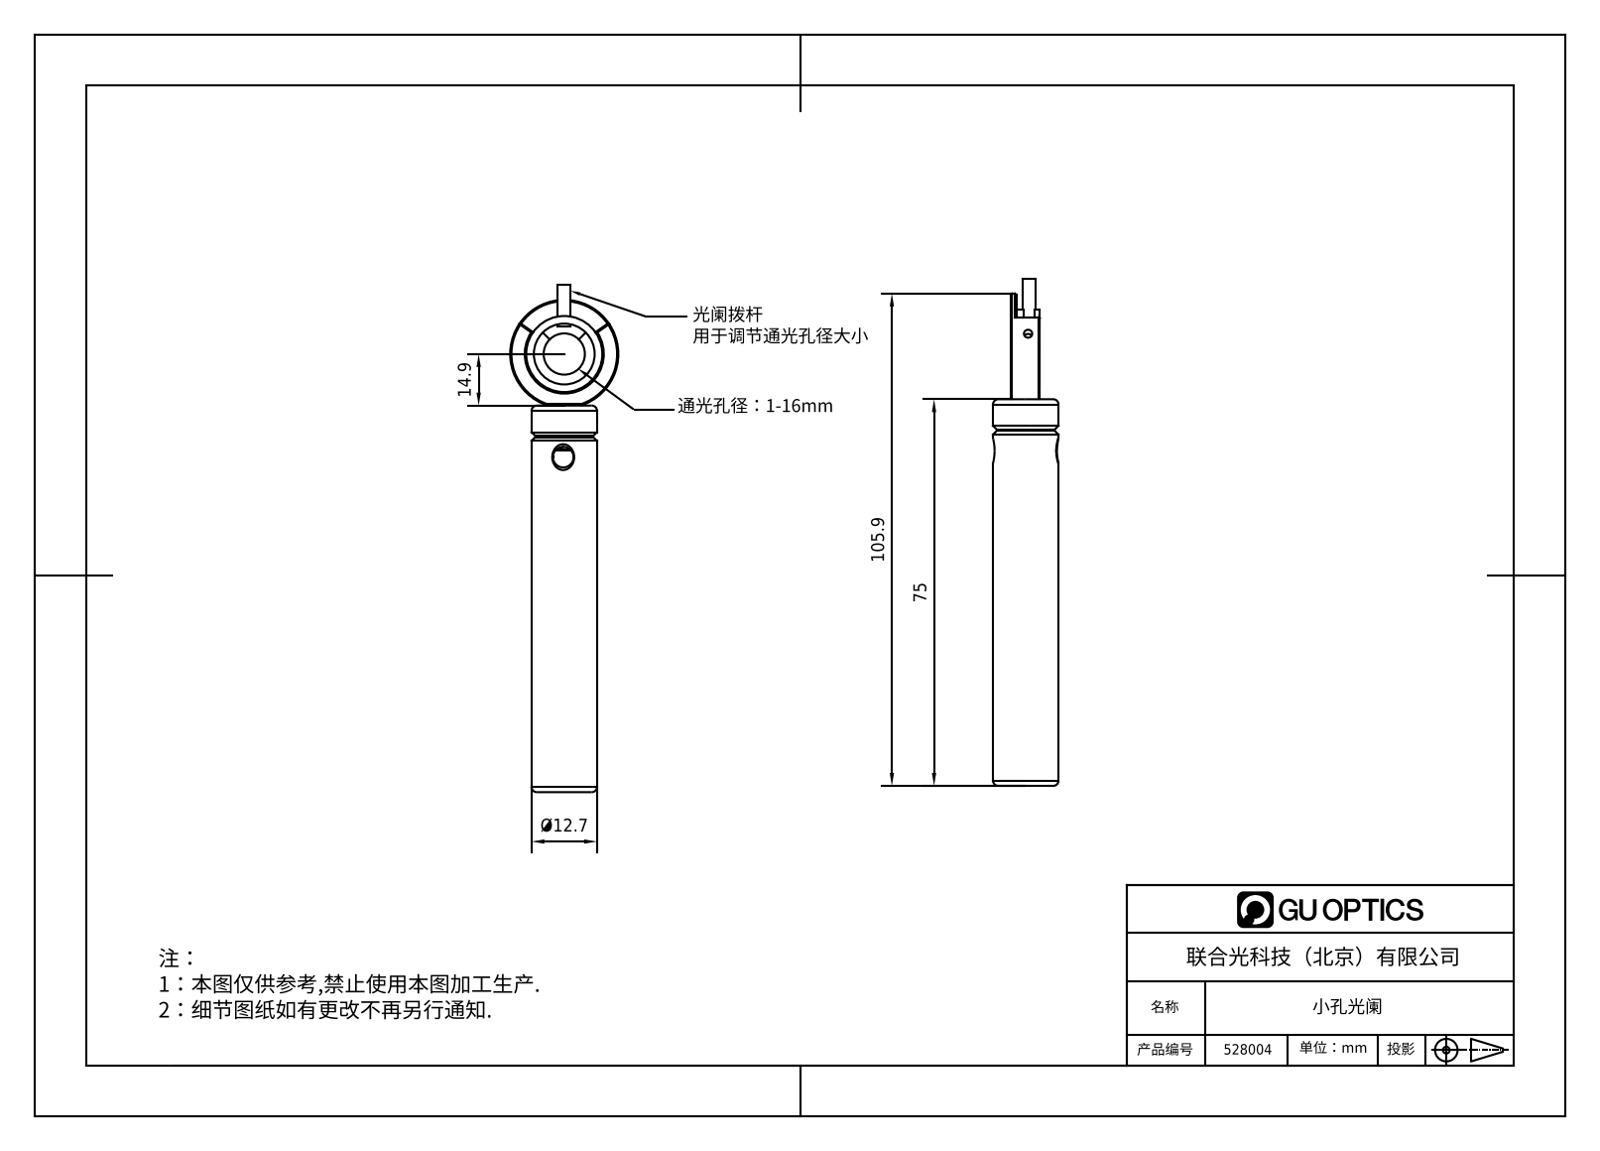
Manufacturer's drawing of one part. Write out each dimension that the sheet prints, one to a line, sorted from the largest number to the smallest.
105.9
75
14.9
Ø12.7
